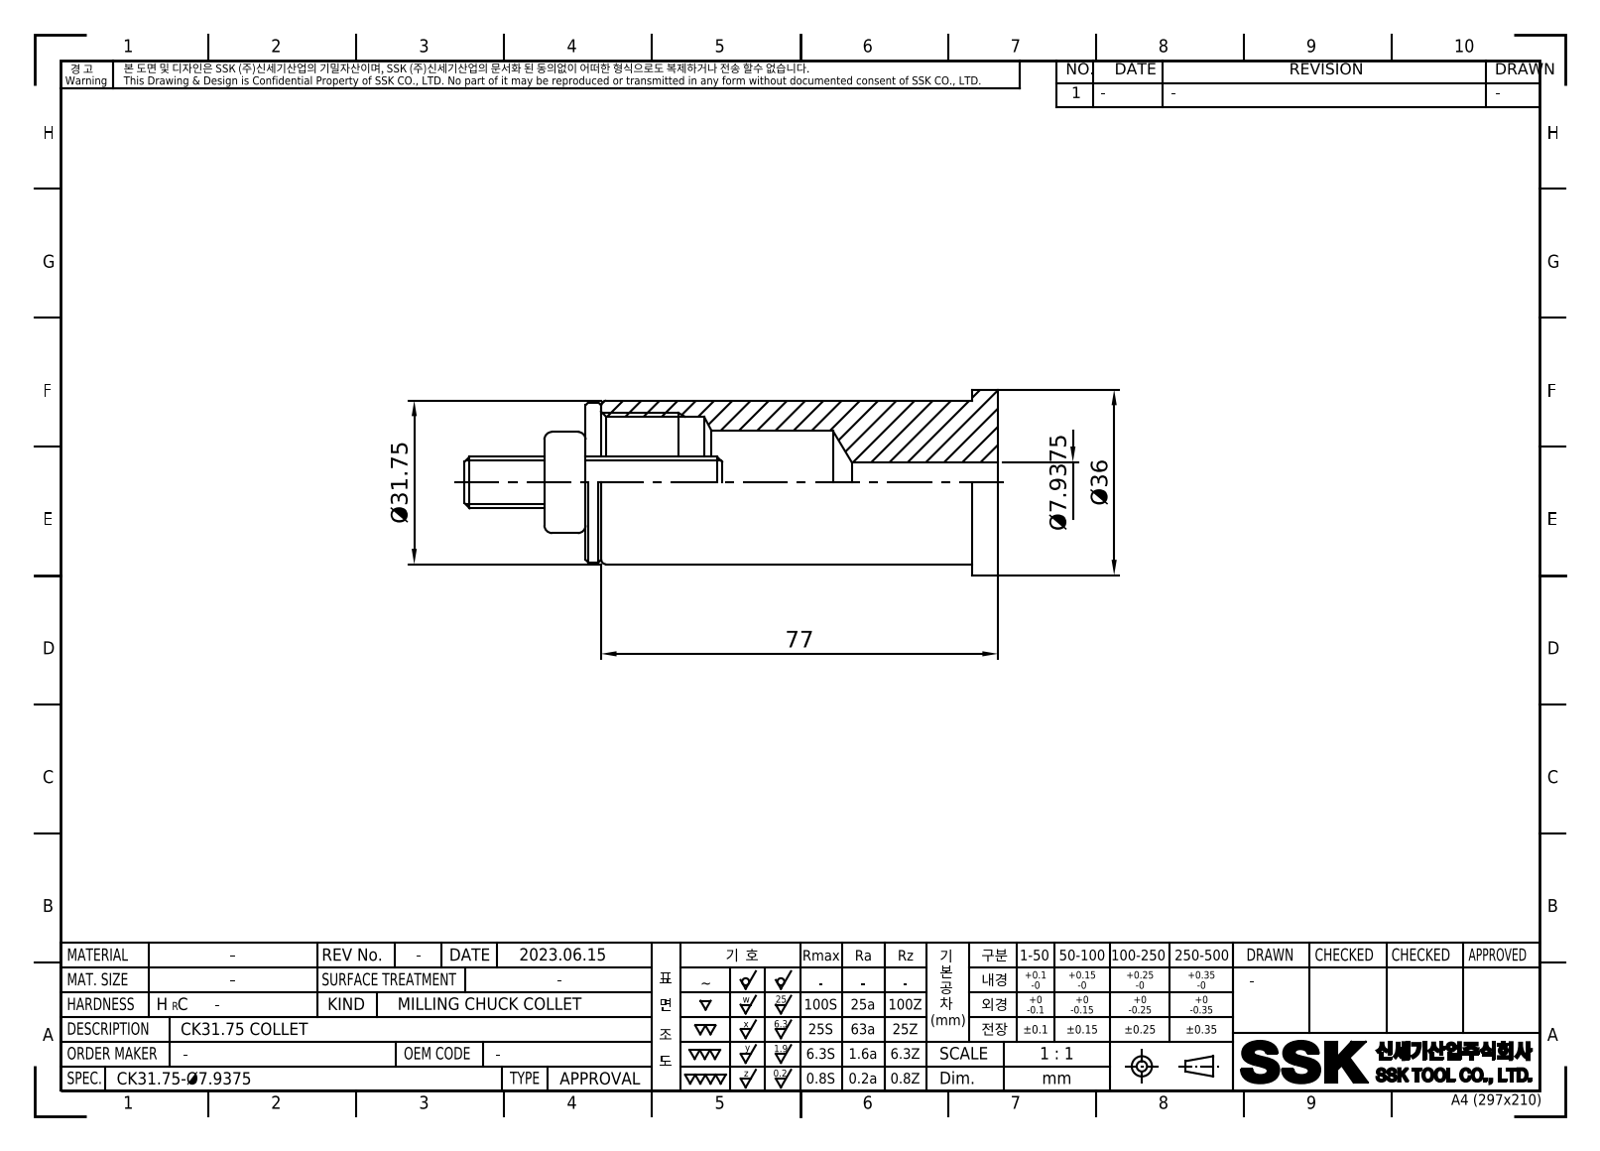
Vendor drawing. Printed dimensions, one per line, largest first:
77
Ø36
Ø31.75
Ø7.9375
